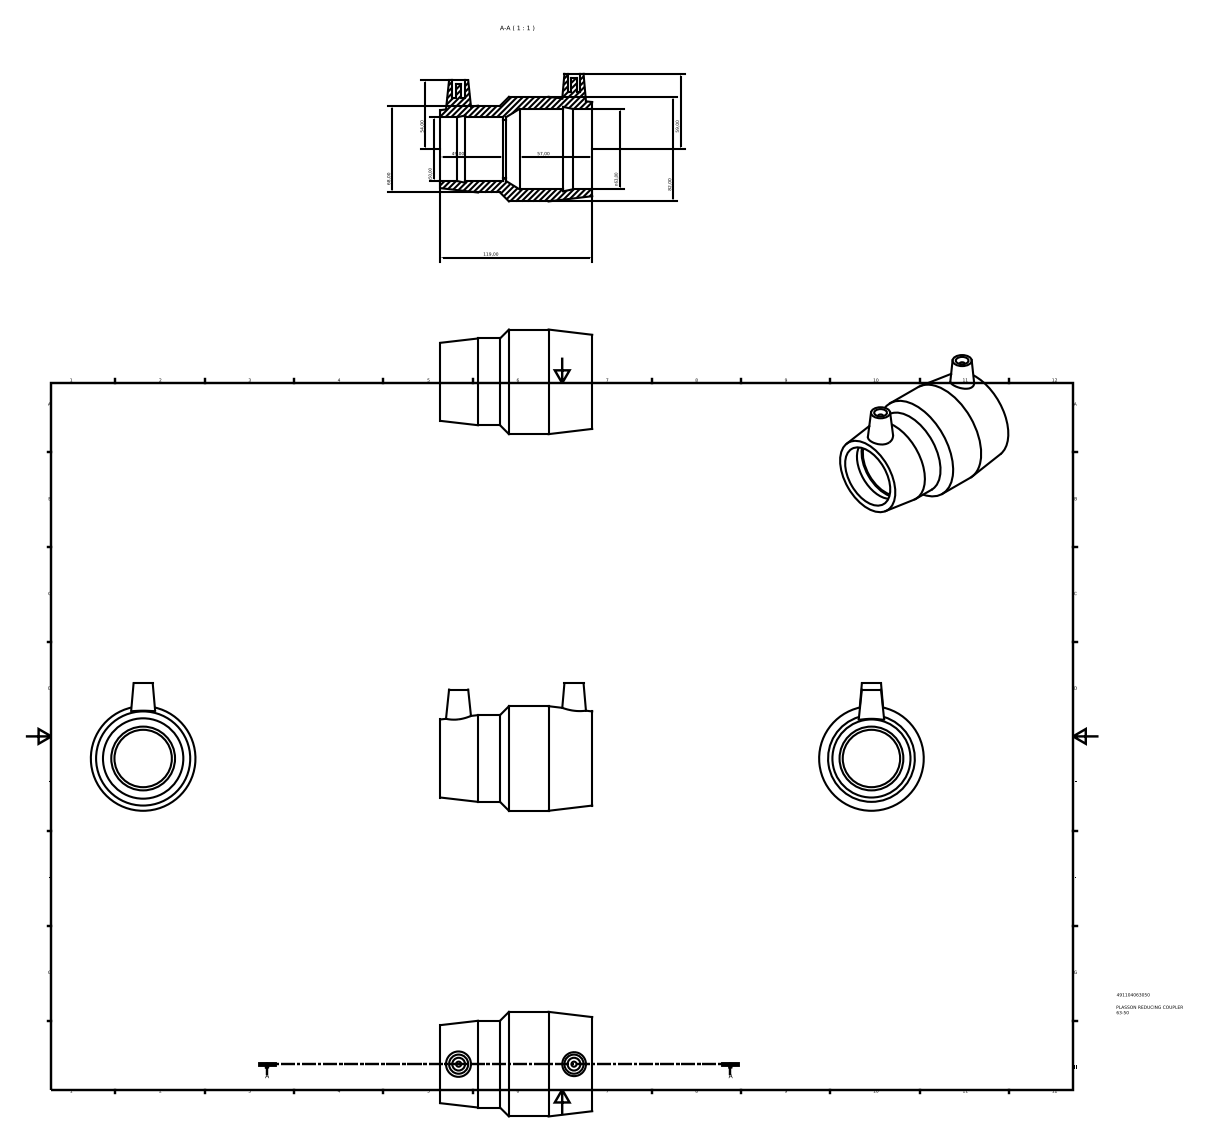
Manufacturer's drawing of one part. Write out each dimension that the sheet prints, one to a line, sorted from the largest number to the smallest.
119,00
82,00
68,00
n63,00
59,00
57,00
54,00
n50,00
49,00
